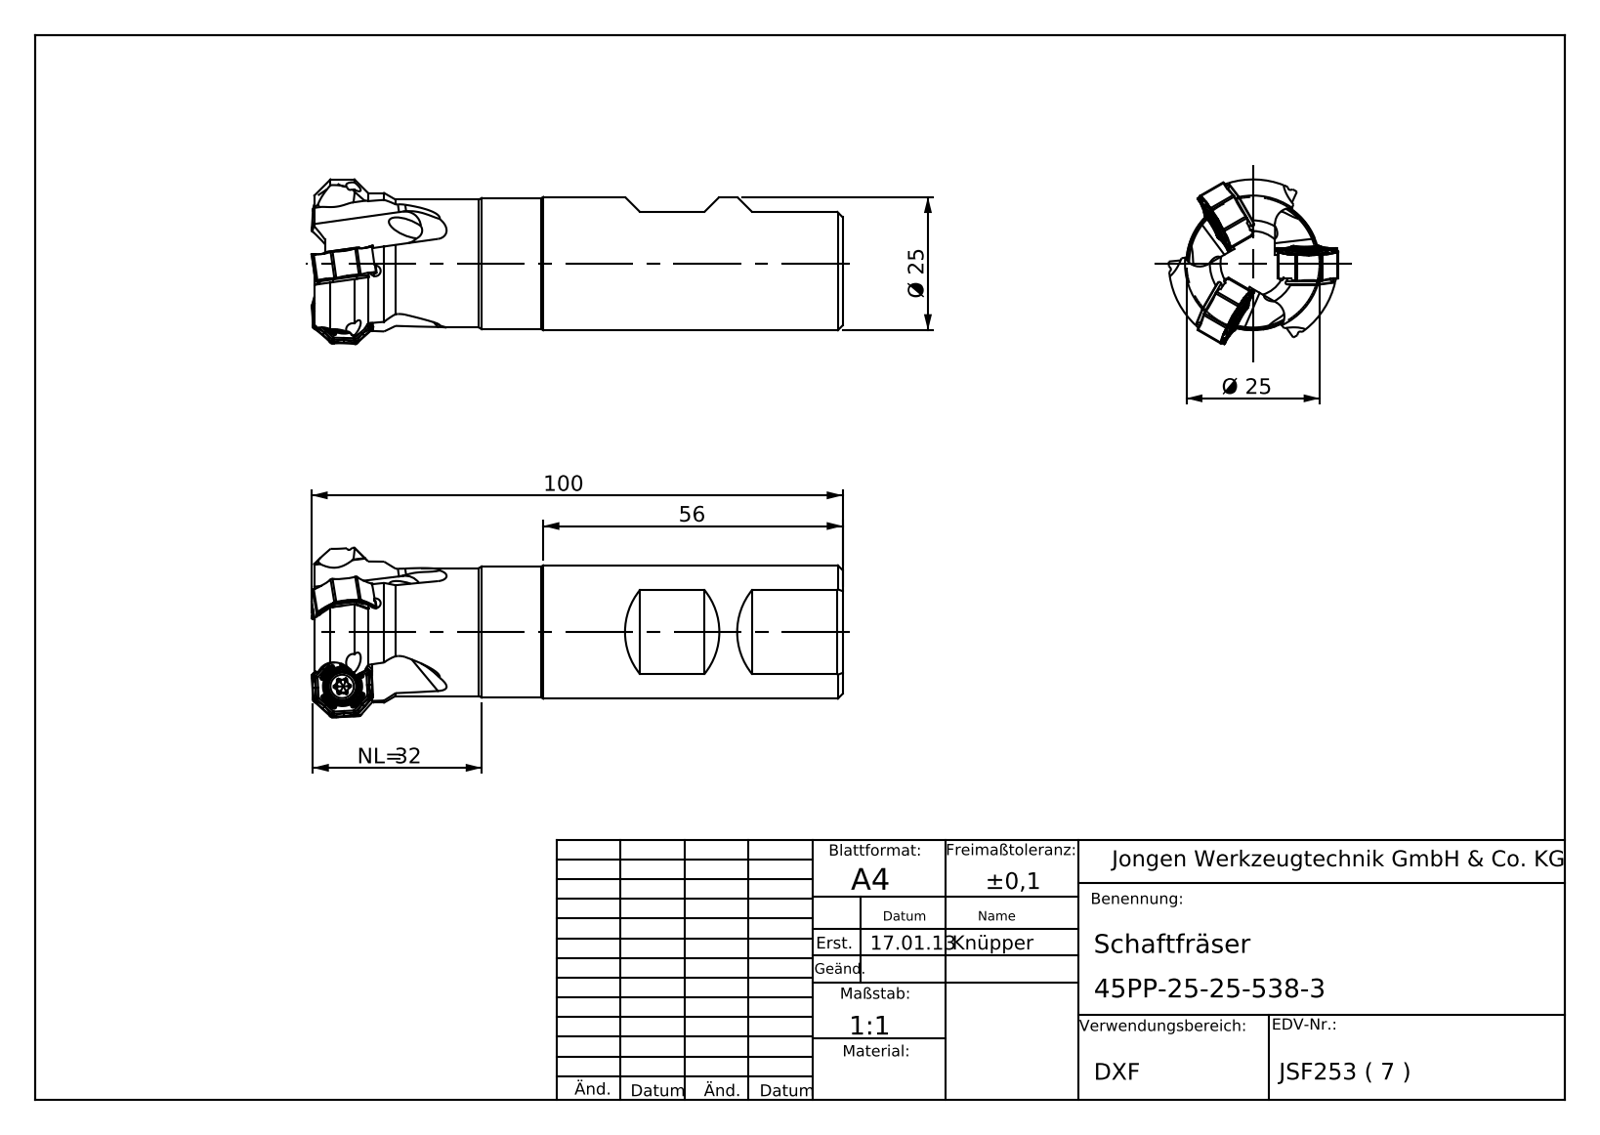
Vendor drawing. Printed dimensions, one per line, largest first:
100
56
NL= 32
Ø 25
Ø 25
